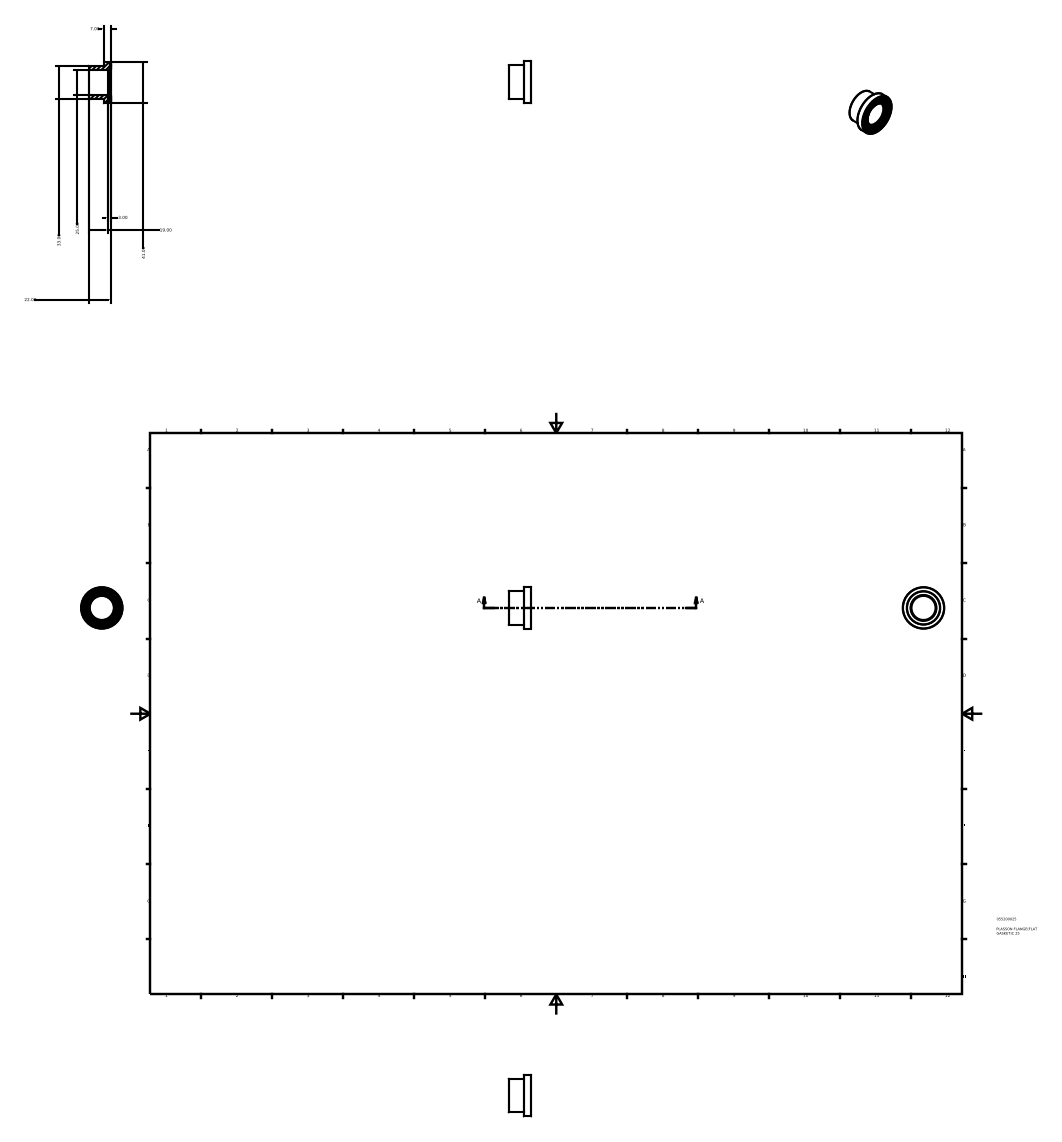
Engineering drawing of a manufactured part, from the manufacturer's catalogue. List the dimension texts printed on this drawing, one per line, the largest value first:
41.00
33.00
25.00
22.00
19.00
7.00
3.00
